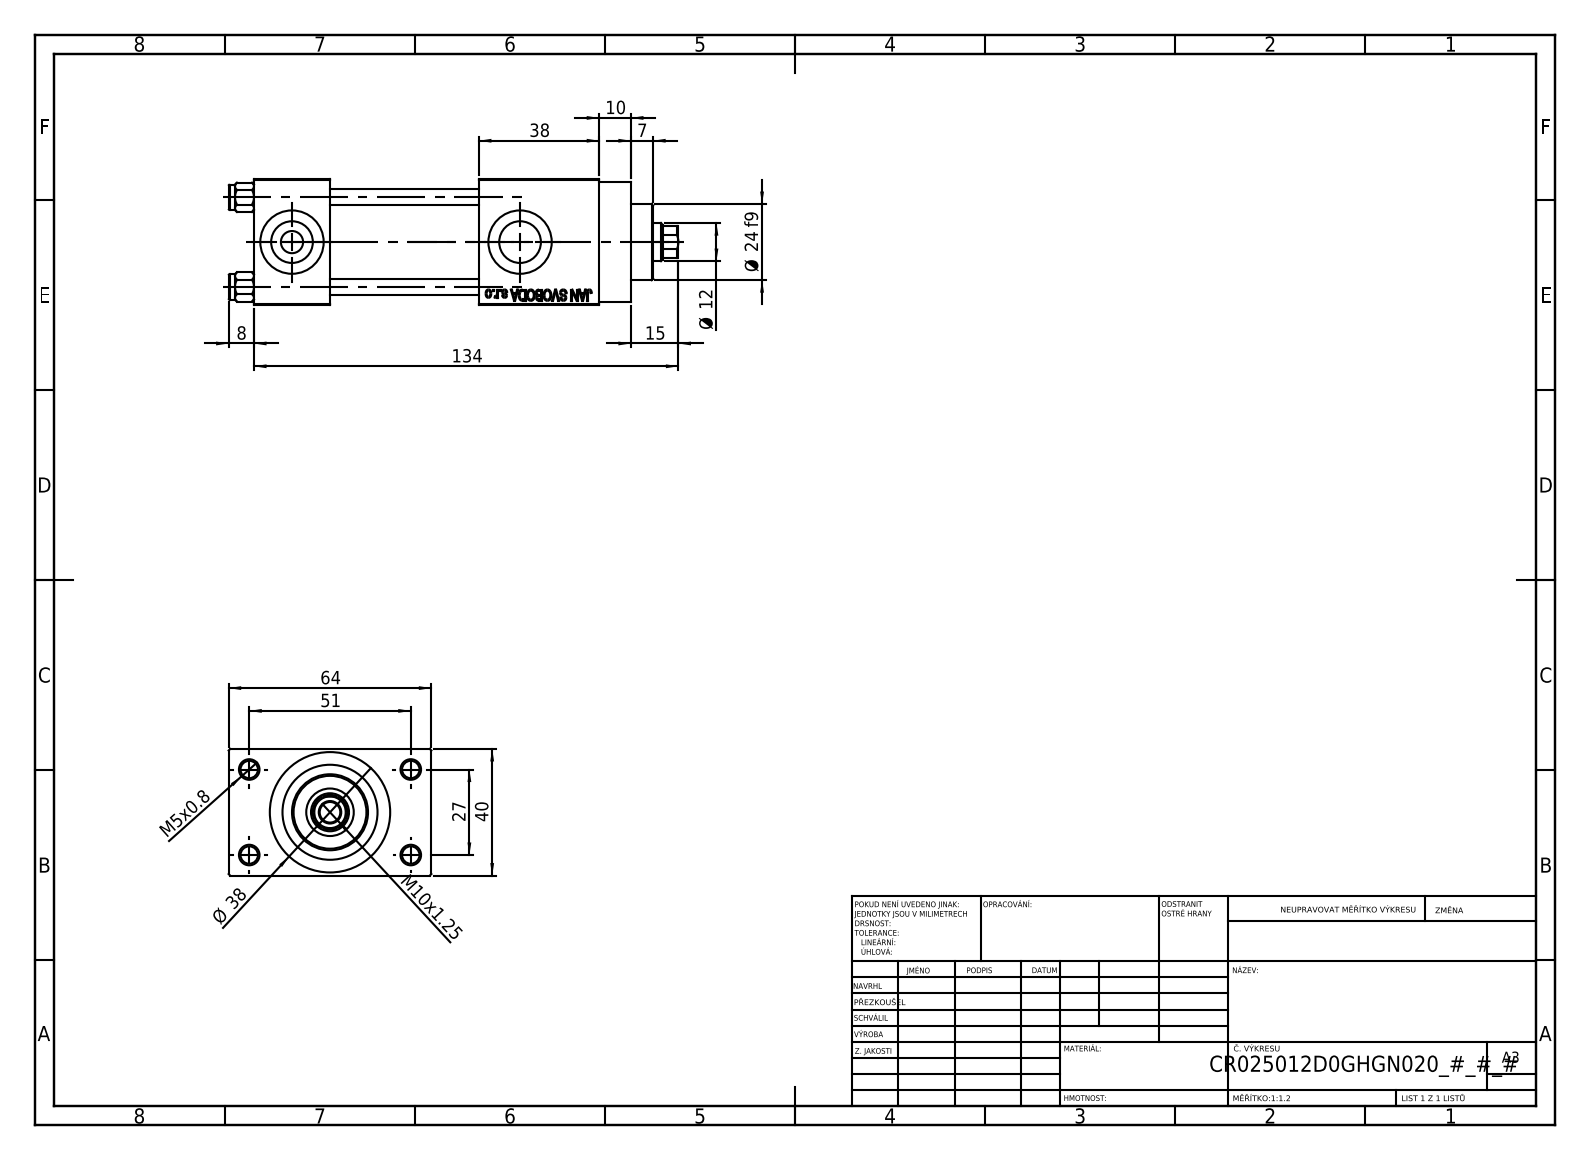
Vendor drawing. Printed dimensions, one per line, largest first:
134
64
51
40
38
Ø 38
27
Ø 24 f9
15
Ø 12
10
M10x1.25
8
7
M5x0.8
